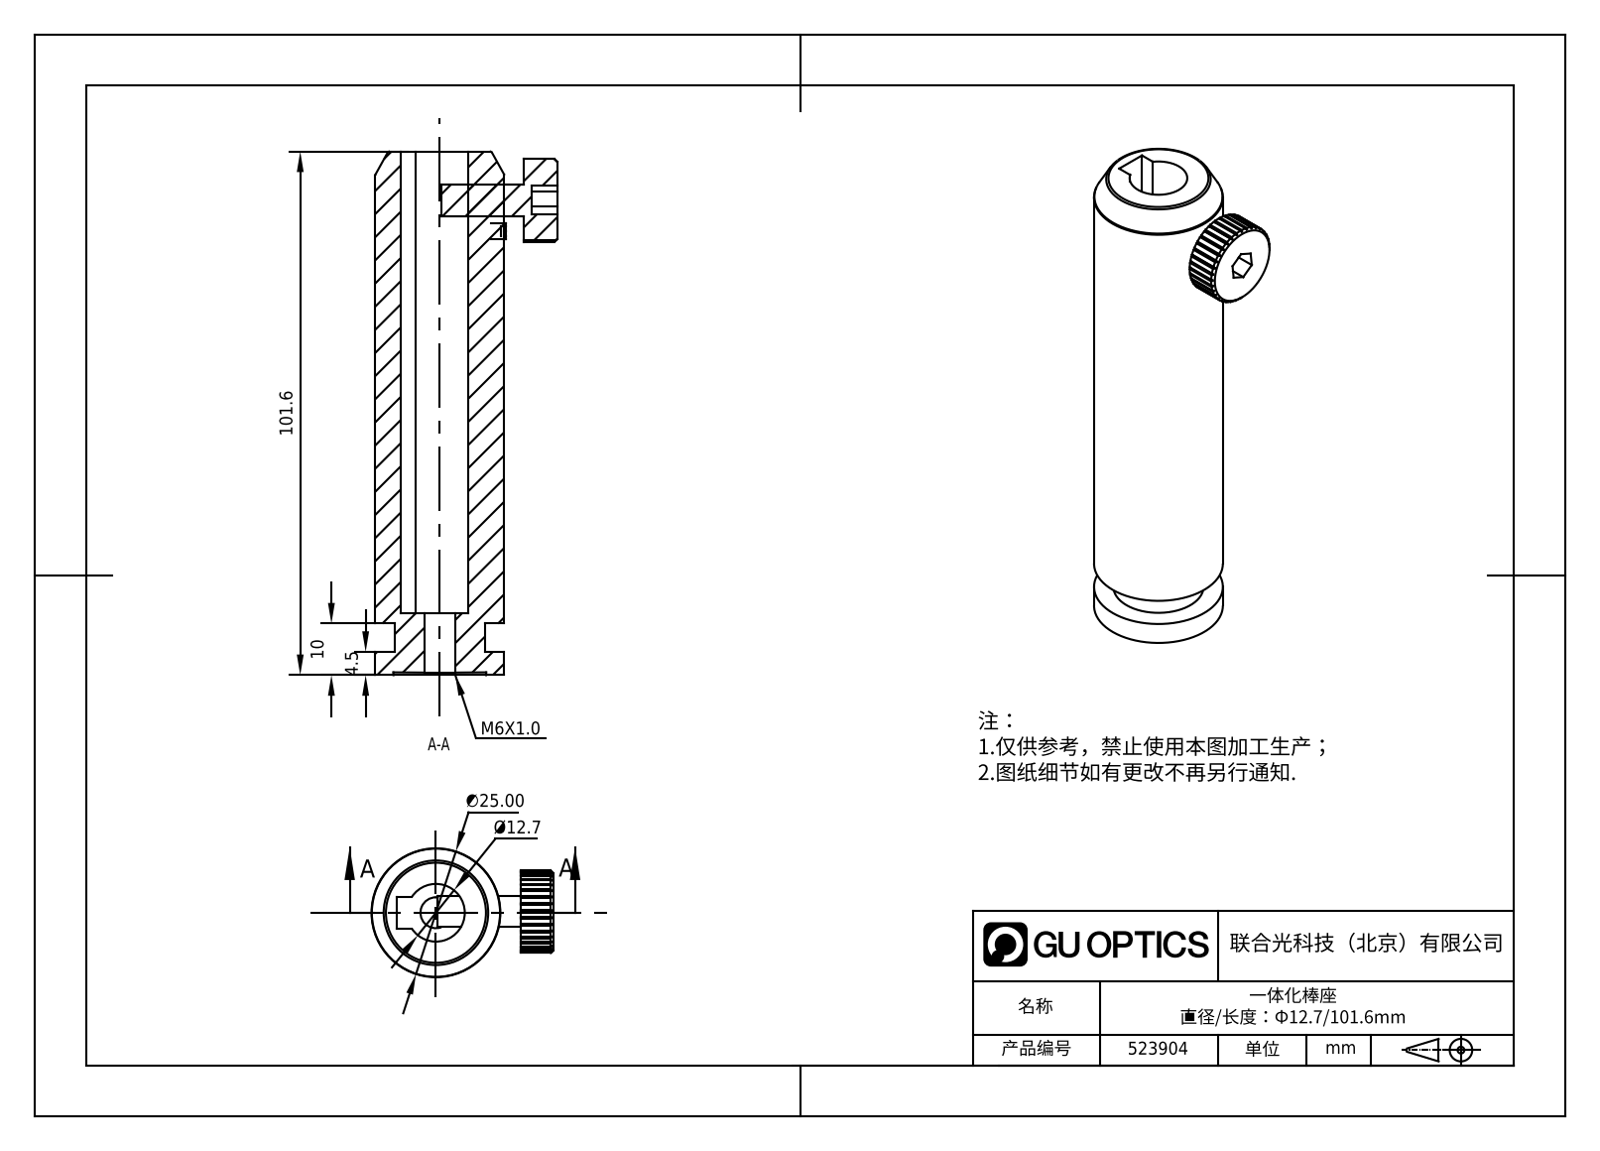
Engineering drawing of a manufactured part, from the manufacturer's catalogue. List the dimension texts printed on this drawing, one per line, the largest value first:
101.6
∅25.00
Ø12.7
10
4.5
